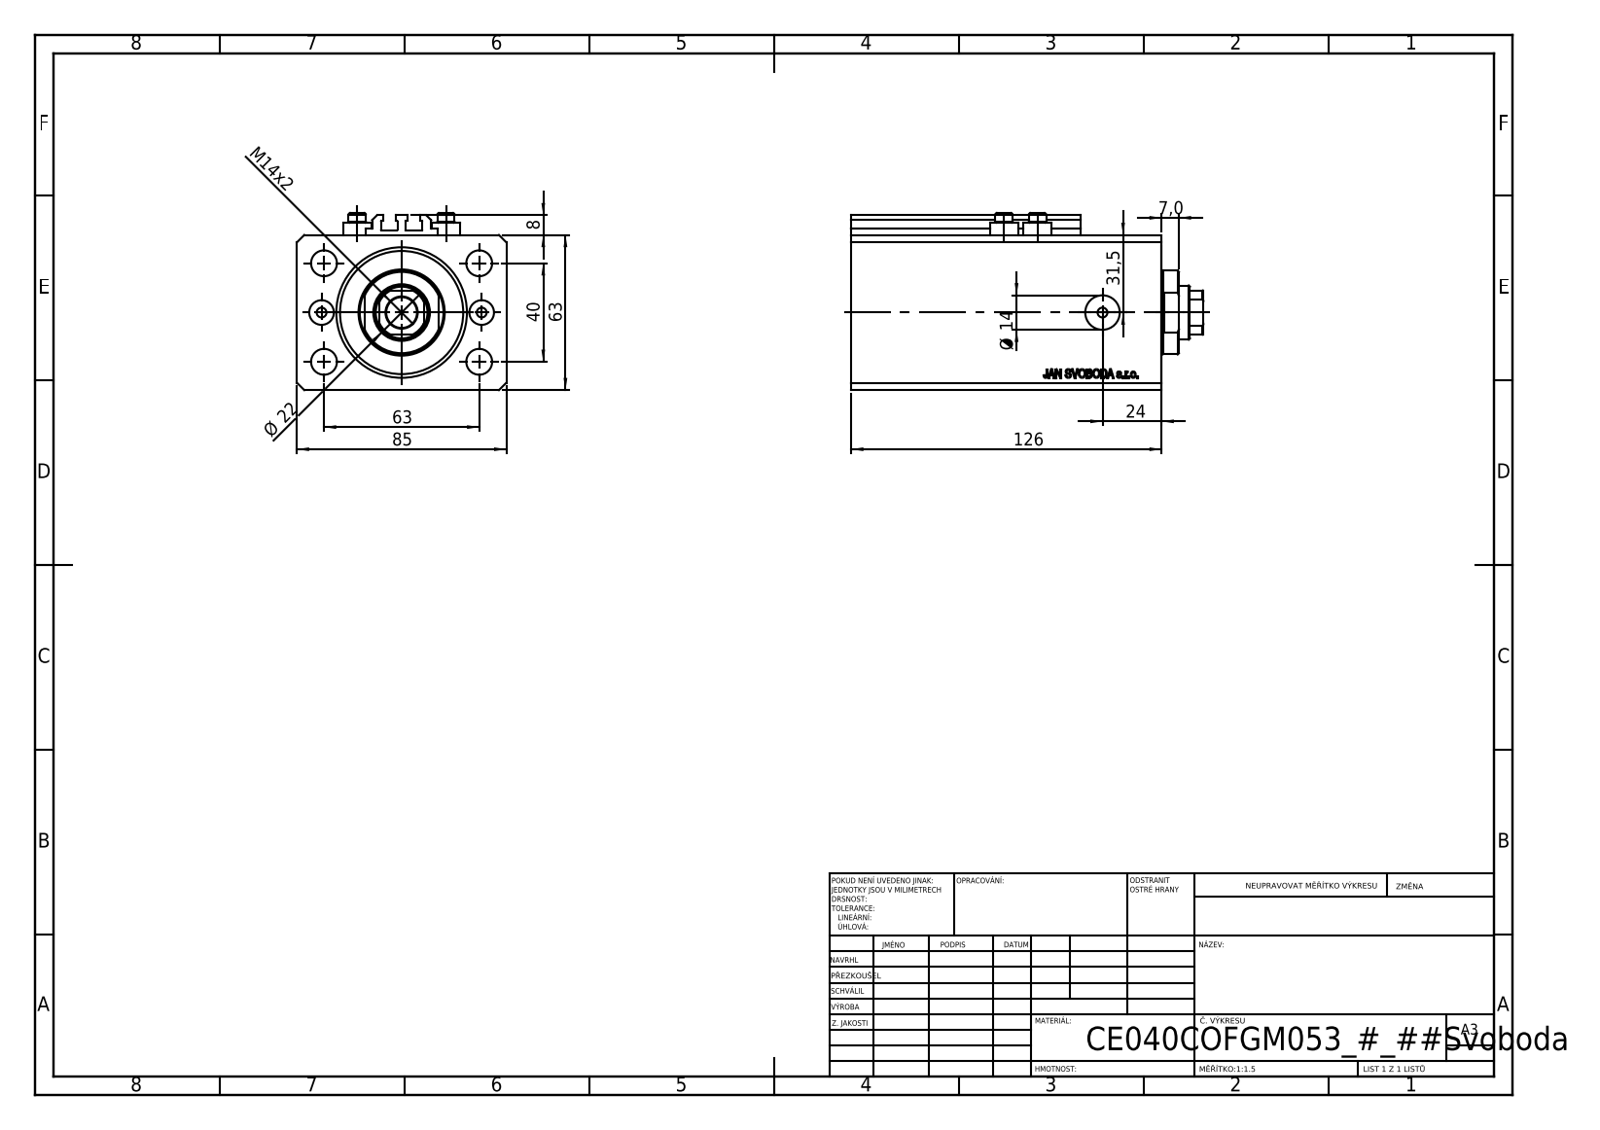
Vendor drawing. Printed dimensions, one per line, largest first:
126
85
63
63
40
31,5
24
Ø 22
M14x2
Ø 14
8
7,0
